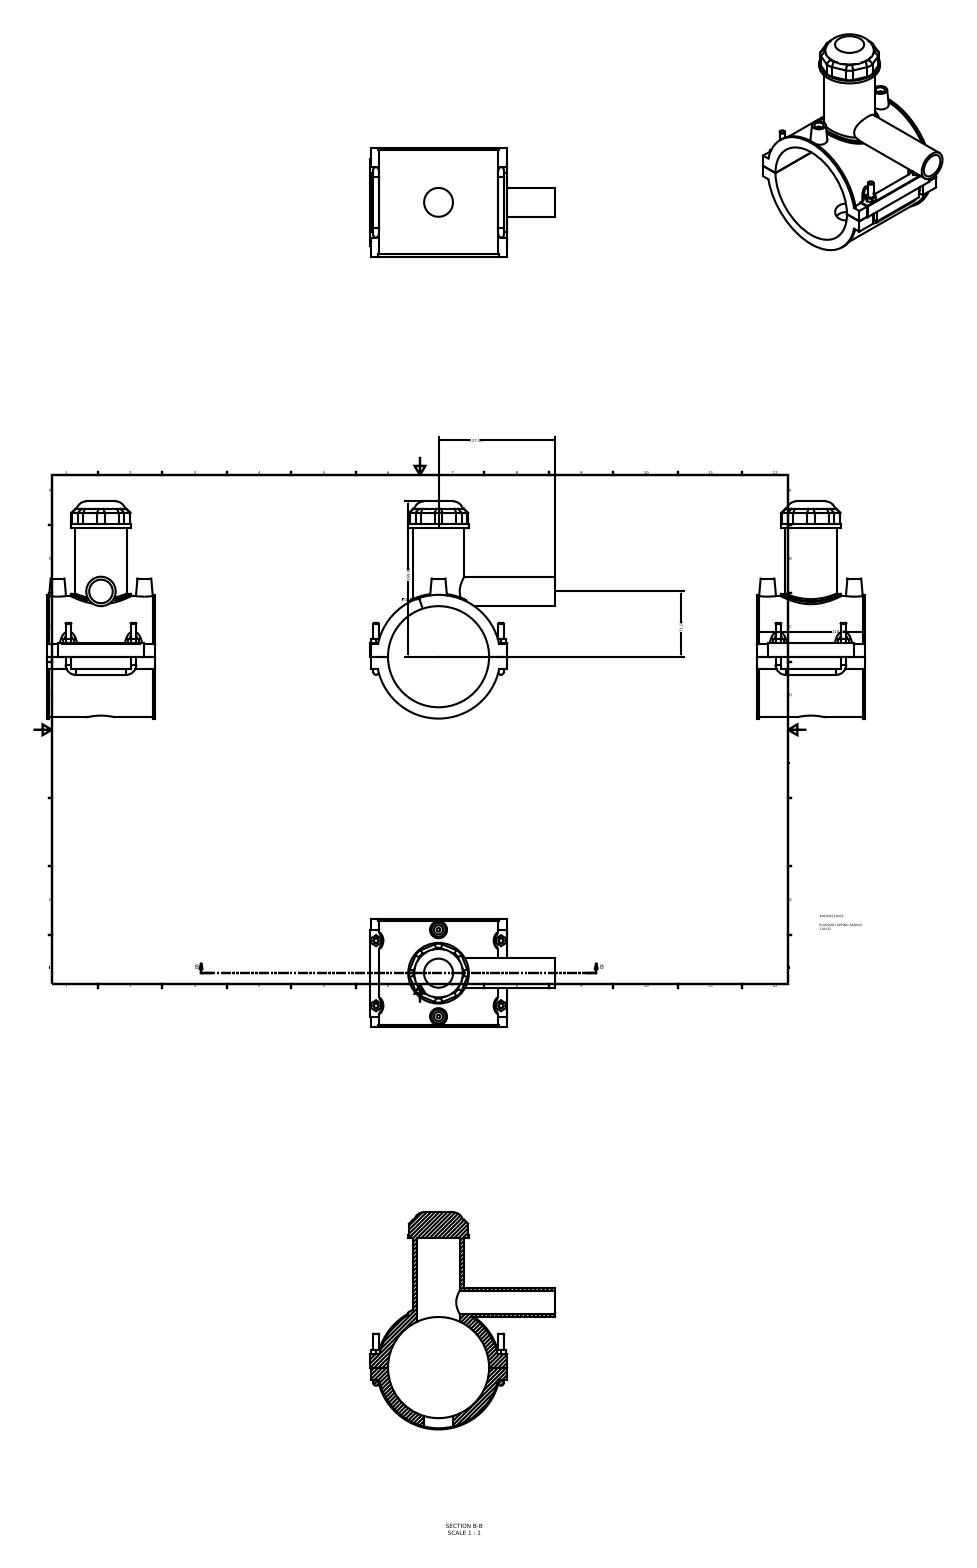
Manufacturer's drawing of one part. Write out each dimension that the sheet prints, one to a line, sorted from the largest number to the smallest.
169.00
127.00
118.00
∅110.00
71.00
